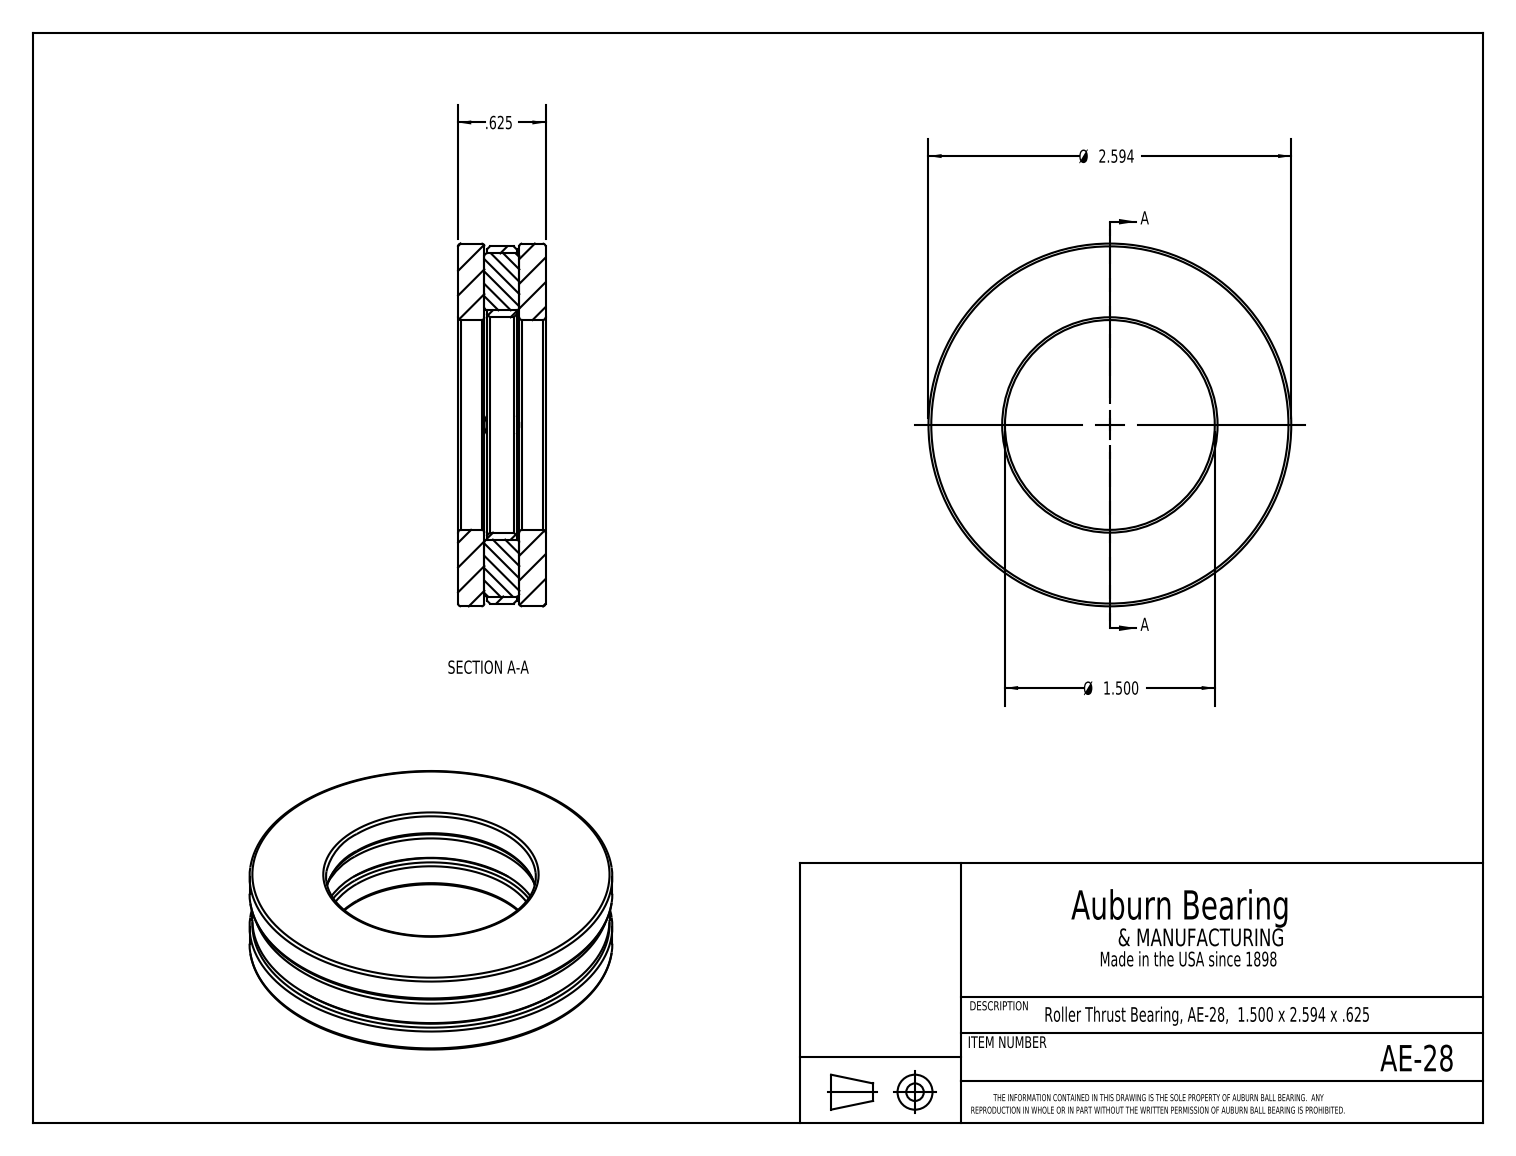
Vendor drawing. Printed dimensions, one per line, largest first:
Ø 2.594
Ø 1.500
.625
